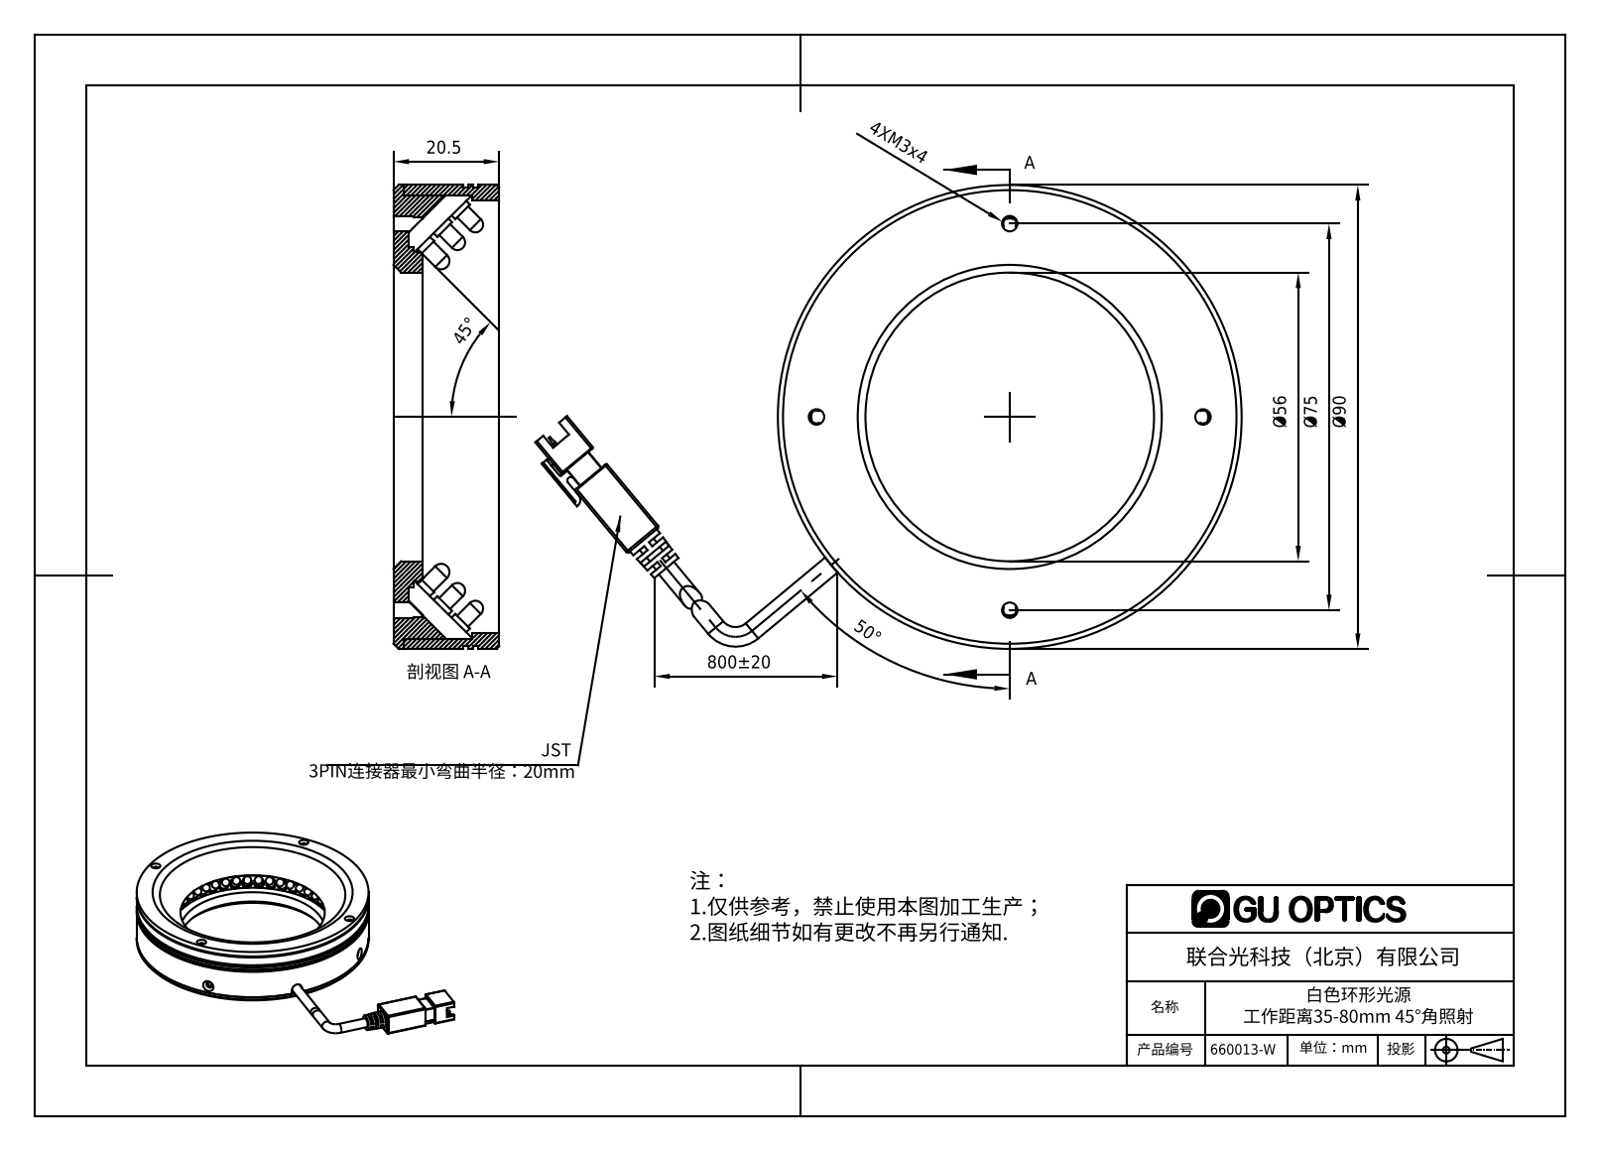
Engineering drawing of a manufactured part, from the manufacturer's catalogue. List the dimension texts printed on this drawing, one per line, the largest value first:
800±20
Ø90
Ø75
Ø56
50°
45°
20.5
4XM3x4
